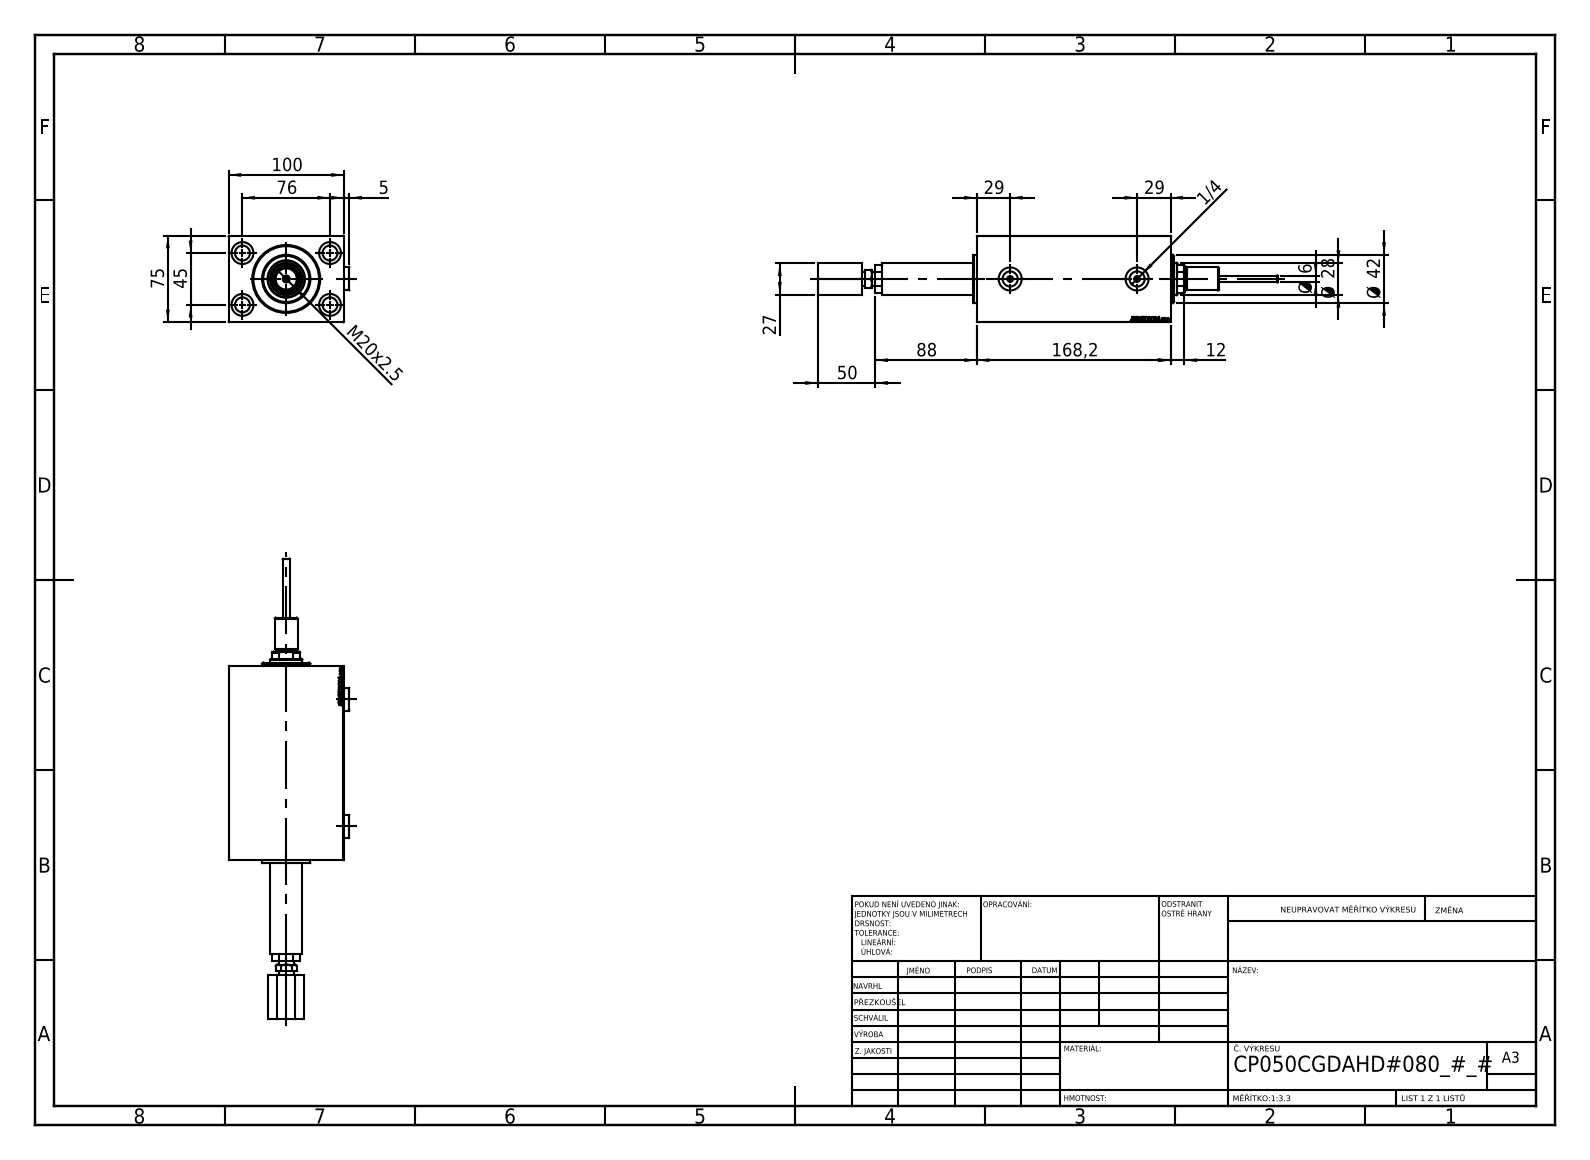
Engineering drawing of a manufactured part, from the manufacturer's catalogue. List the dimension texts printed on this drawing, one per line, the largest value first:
168,2
100
88
76
75
50
45
Ø 42
29
29
Ø 28
27
M20x2.5
12
Ø 6
5
1/4
